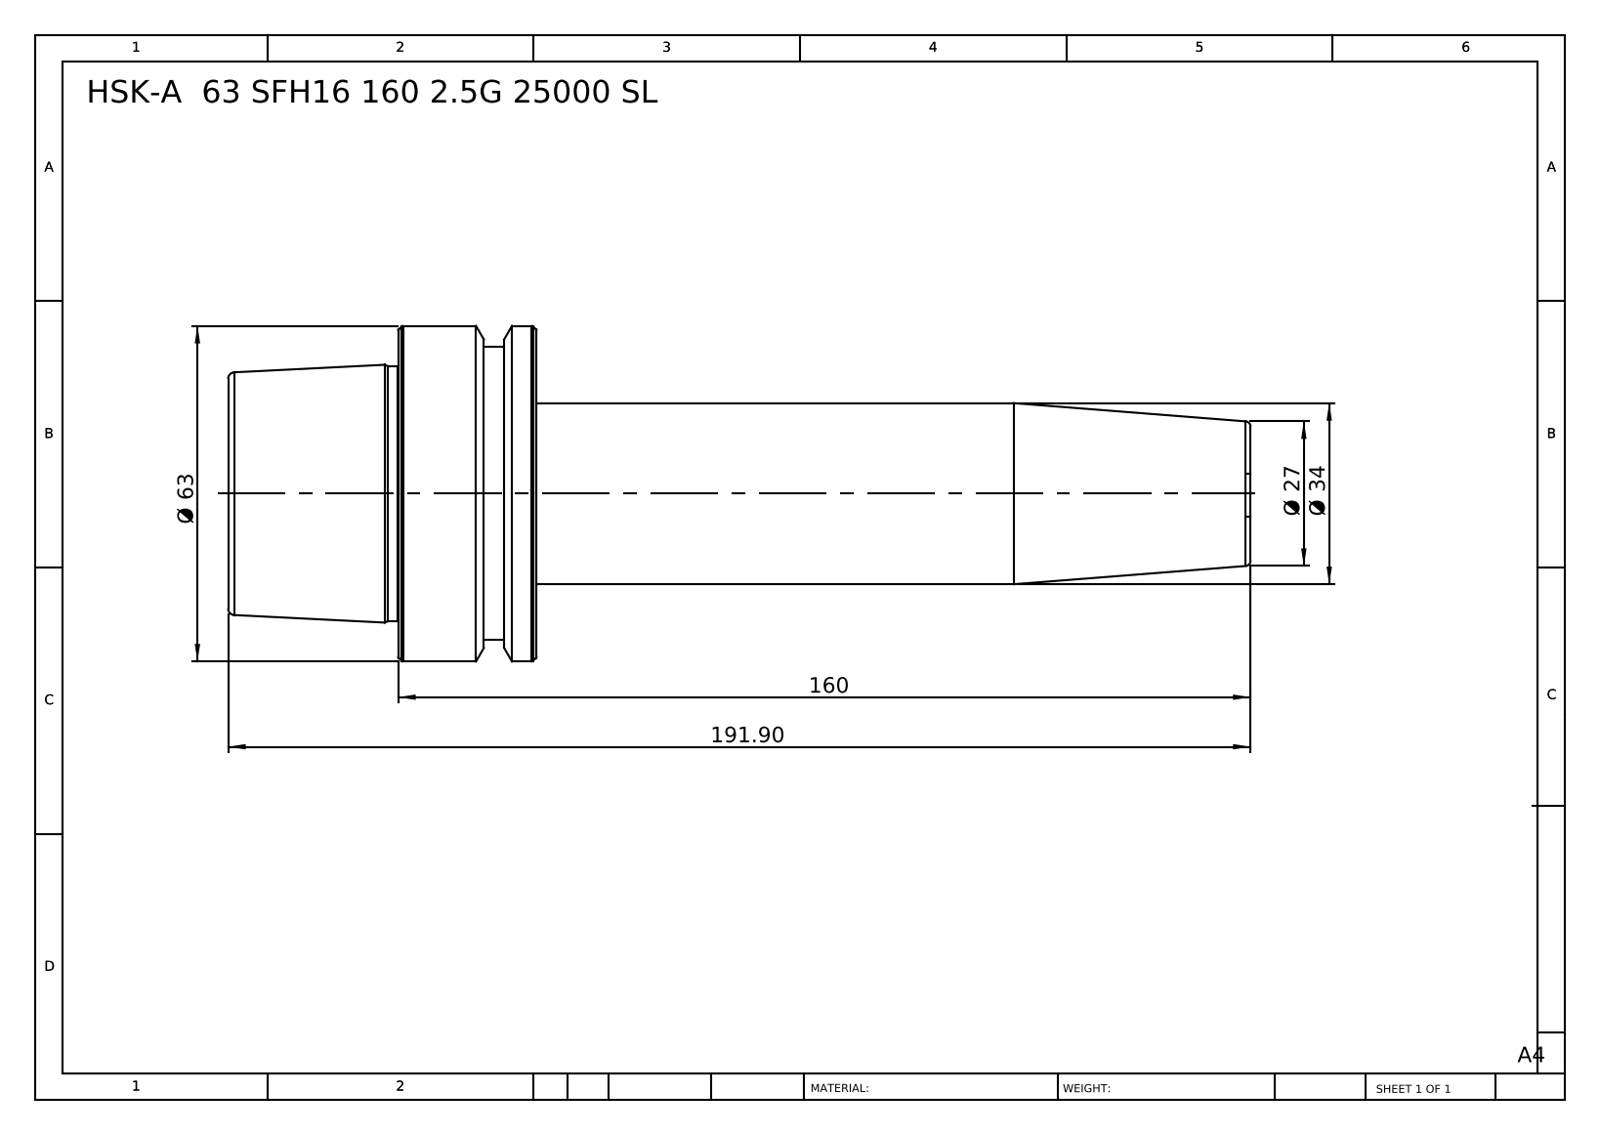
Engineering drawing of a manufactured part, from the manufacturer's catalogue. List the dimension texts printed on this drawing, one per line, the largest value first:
191.90
160
Ø 63
Ø 34
Ø 27
